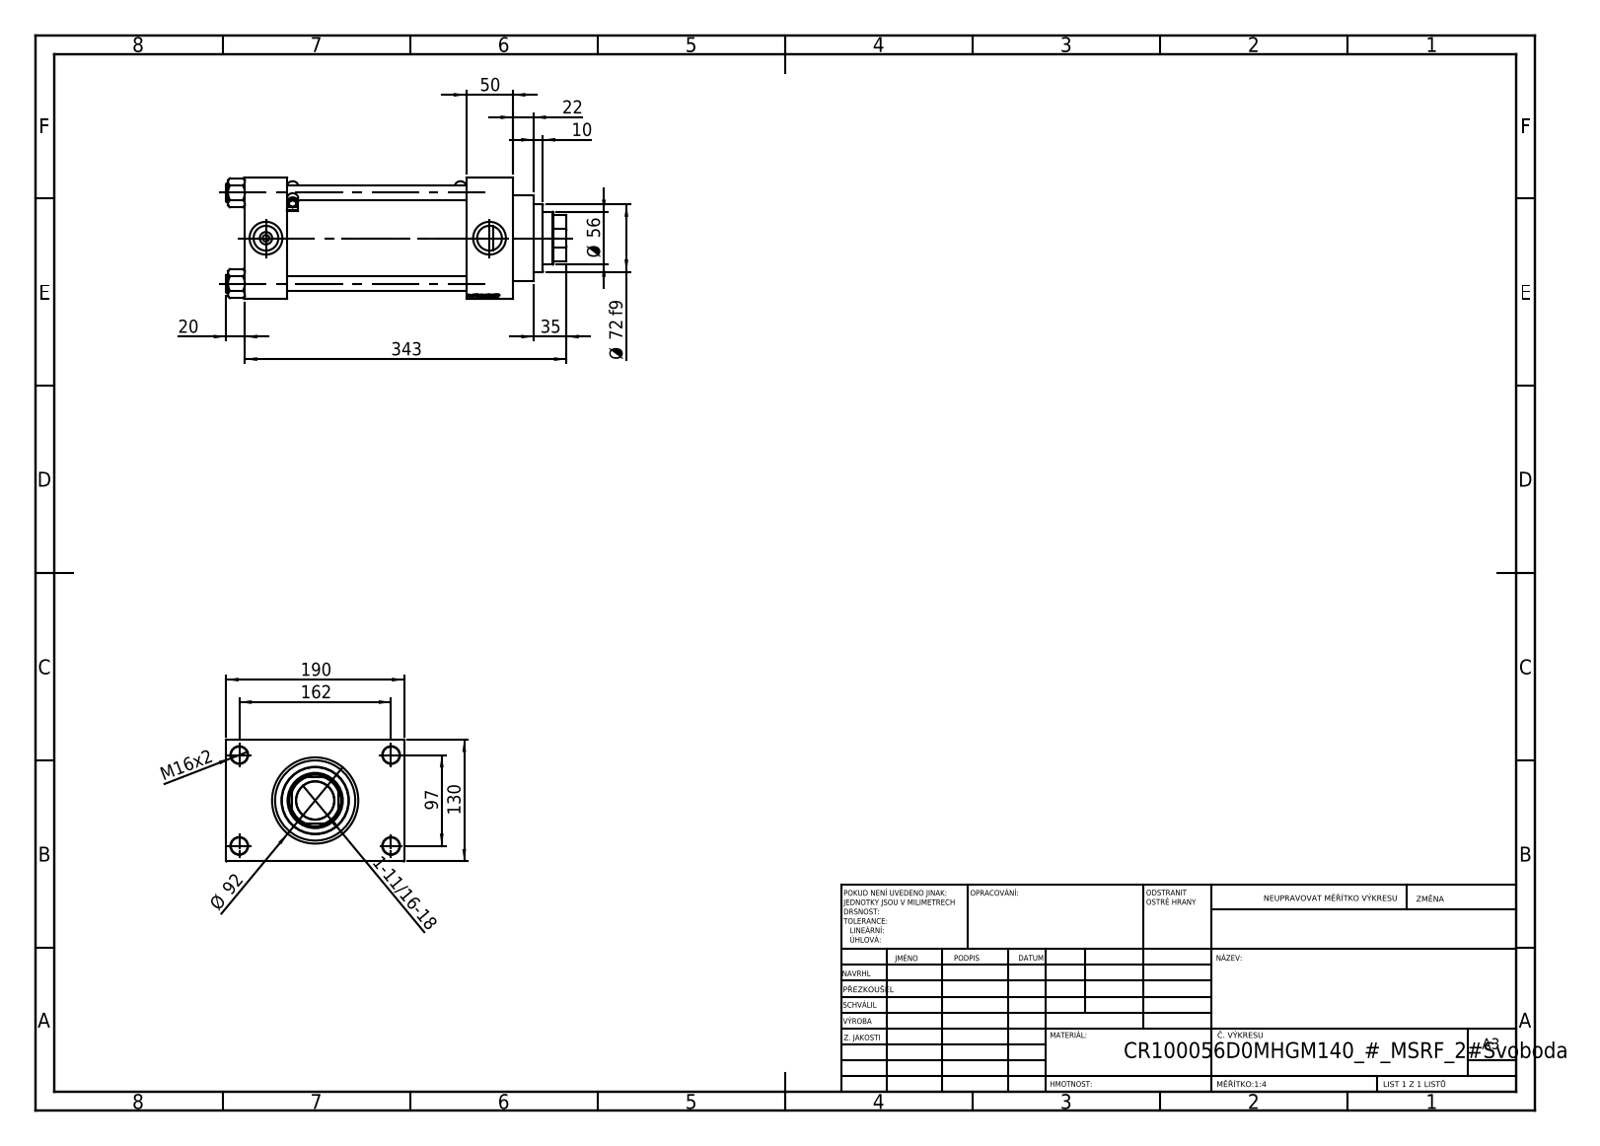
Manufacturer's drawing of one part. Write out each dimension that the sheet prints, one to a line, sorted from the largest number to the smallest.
343
190
162
130
97
Ø 92
Ø 72 f9
Ø 56
50
35
22
20
M16x2
10
1-11/16-18
